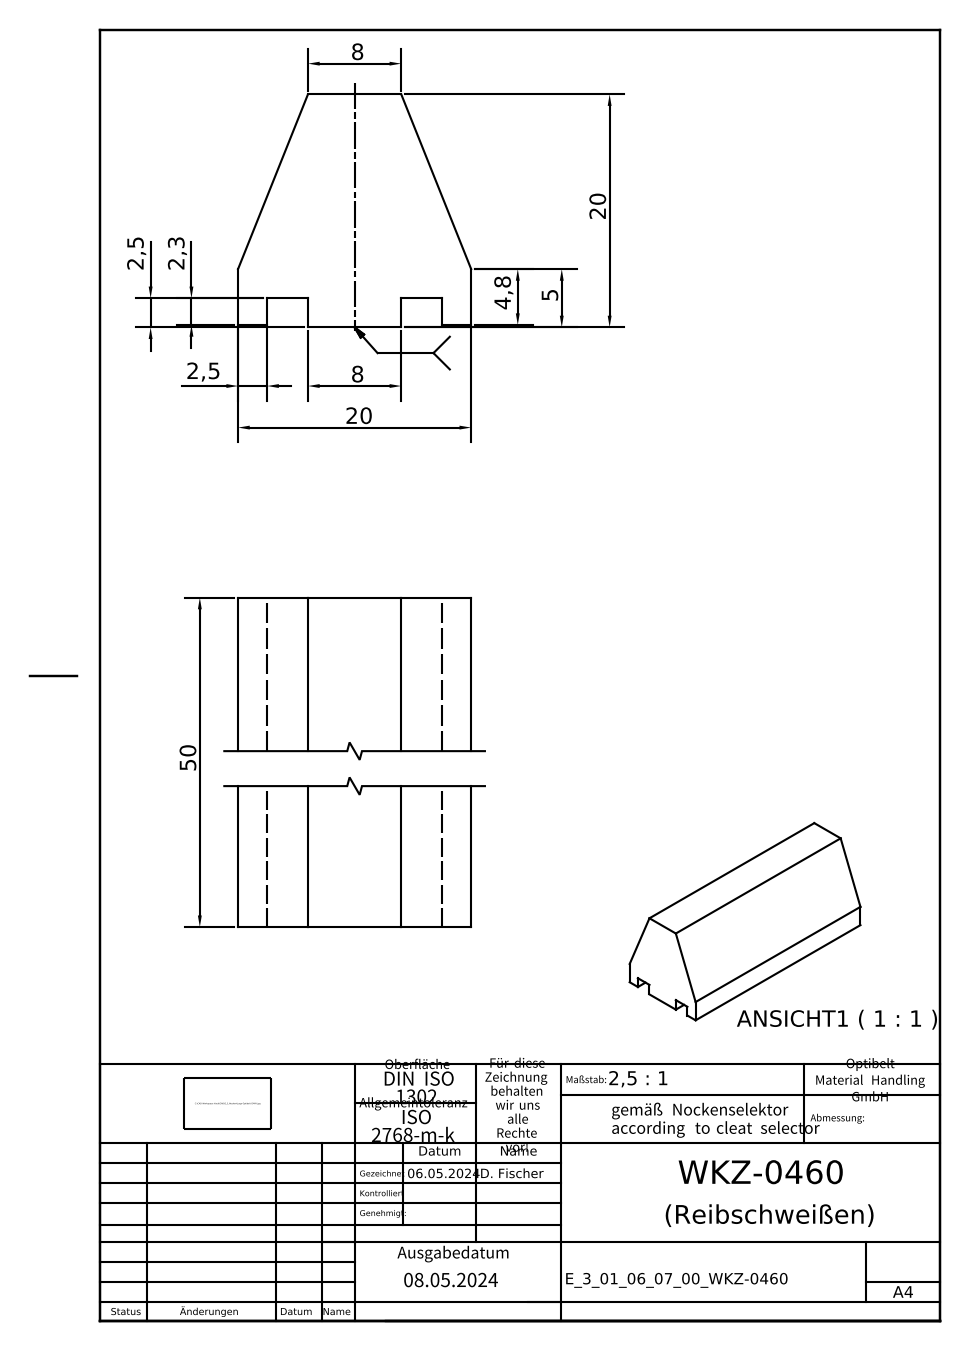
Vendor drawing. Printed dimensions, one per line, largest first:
50
20
20
8
8
5
4,8
2,5
2,5
2,3
